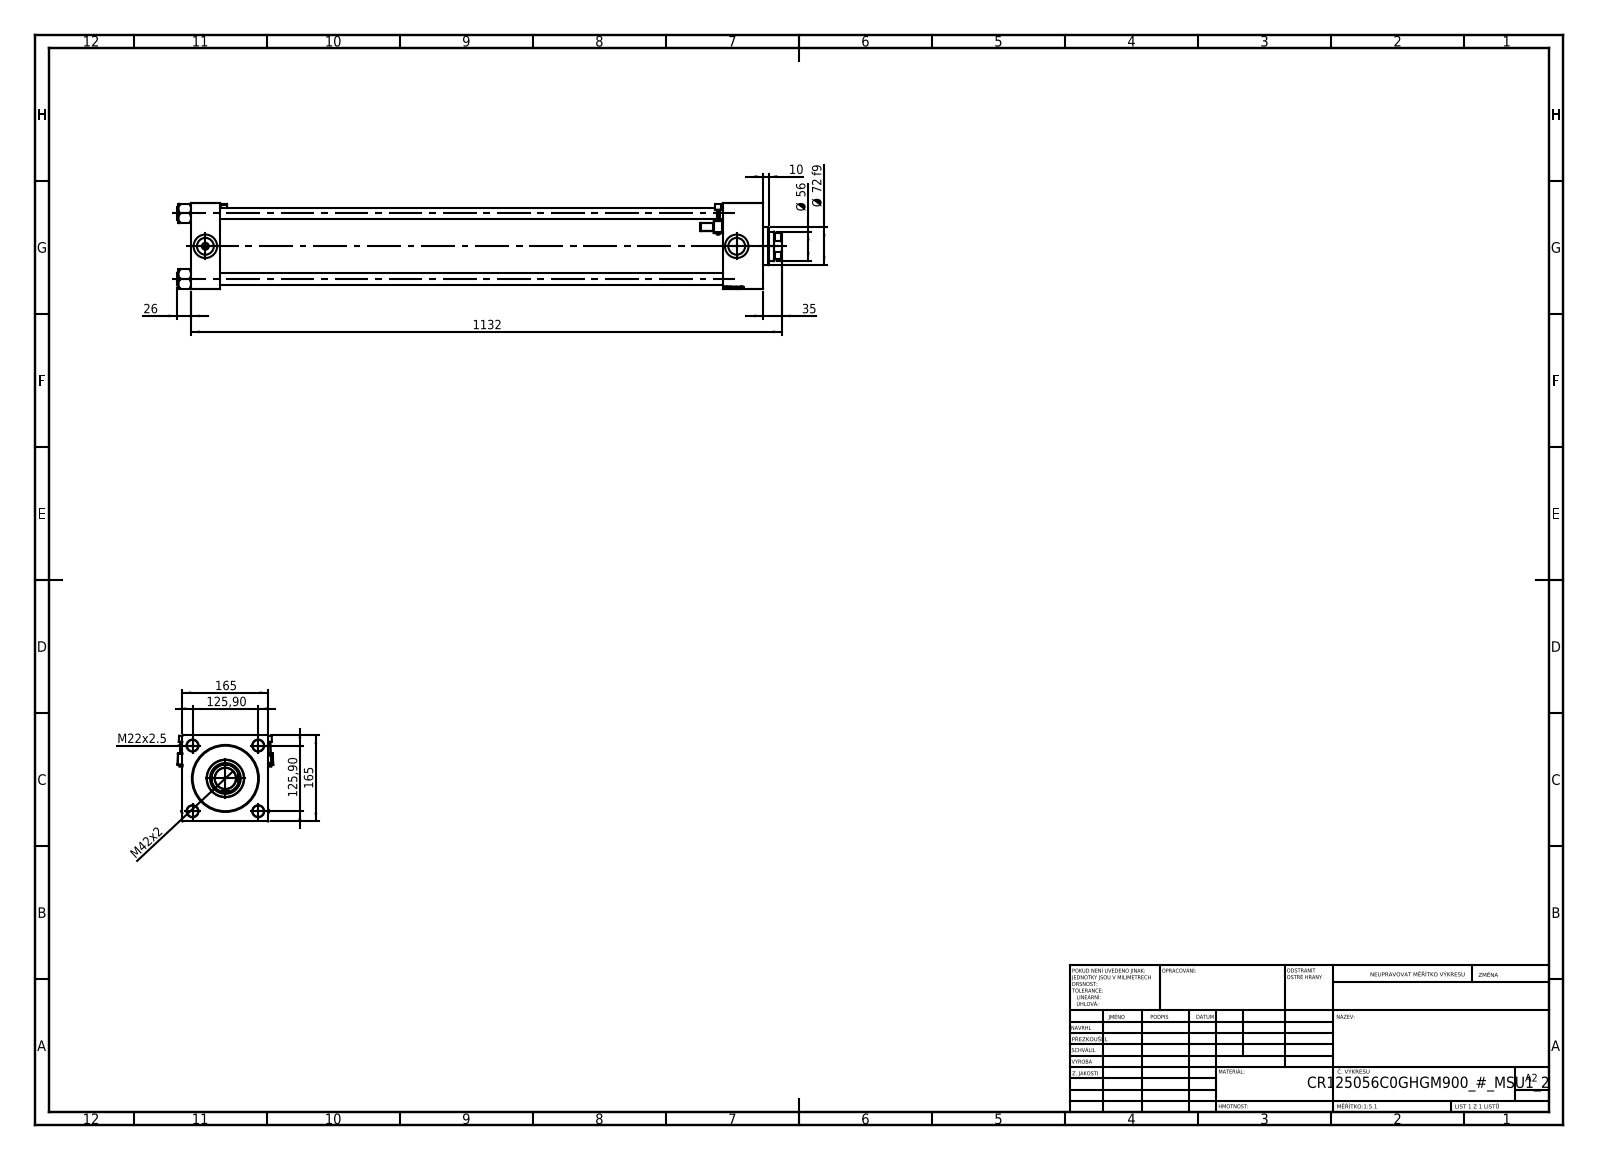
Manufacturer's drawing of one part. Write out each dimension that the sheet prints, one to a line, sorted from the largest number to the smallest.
1132
165
165
125,90
125,90
Ø 72 f9
Ø 56
M42x2
35
26
M22x2.5
10
